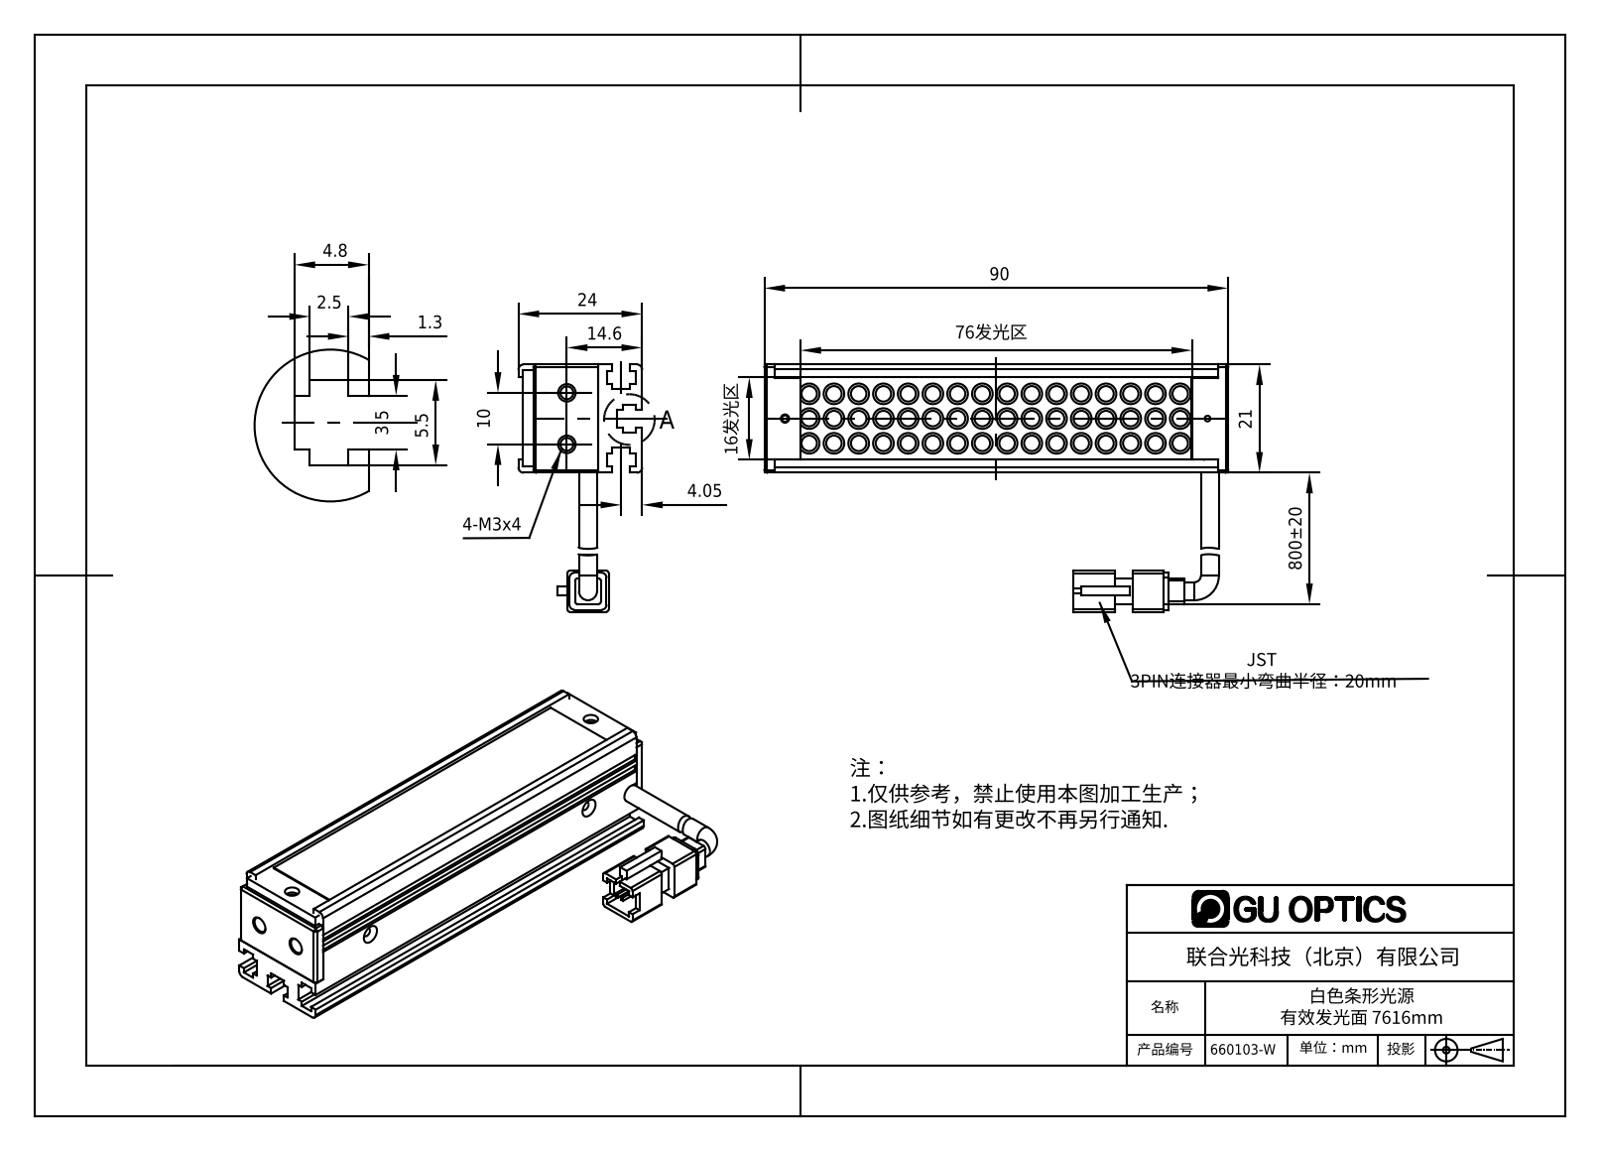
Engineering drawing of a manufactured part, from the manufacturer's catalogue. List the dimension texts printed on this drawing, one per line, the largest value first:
800±20
90
76发光区
24
21
16发光区
14.6
10
5.5
4.8
4.05
3.5
2.5
1.3
